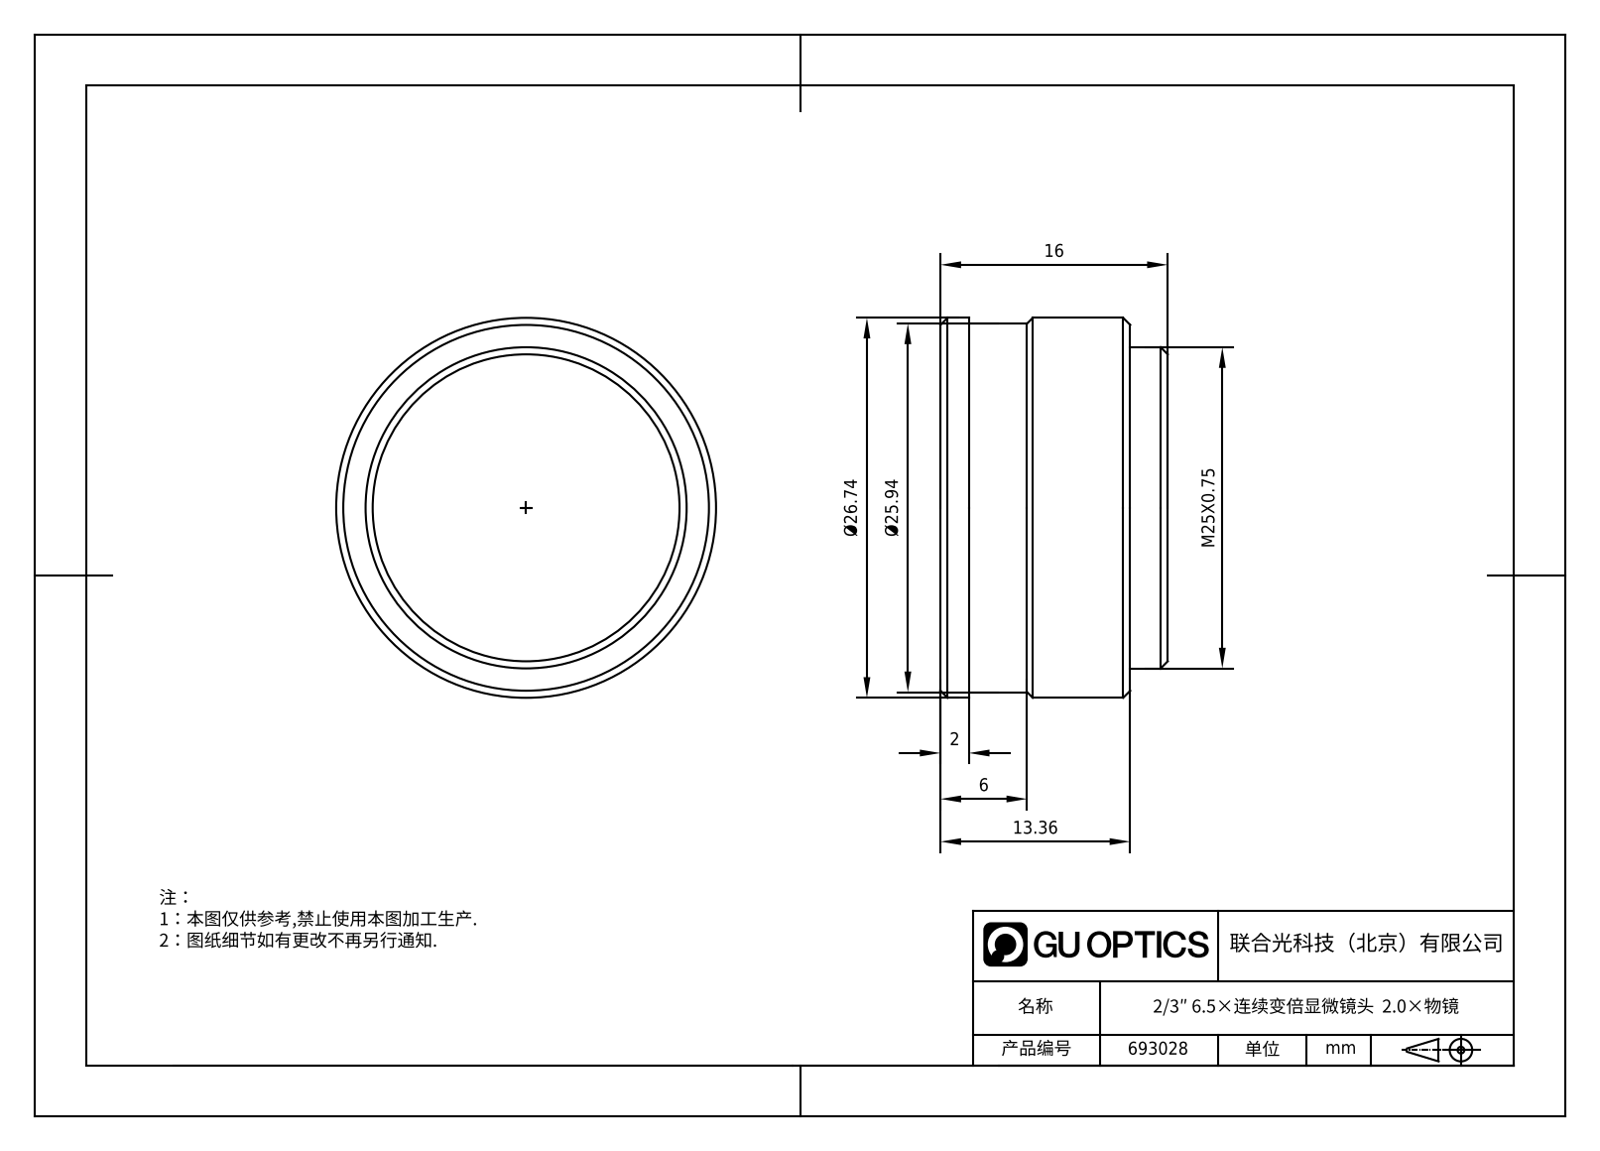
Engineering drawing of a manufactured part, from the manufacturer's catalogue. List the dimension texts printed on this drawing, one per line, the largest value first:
Ø26.74
Ø25.94
M25X0.75
16
13.36
6
2
